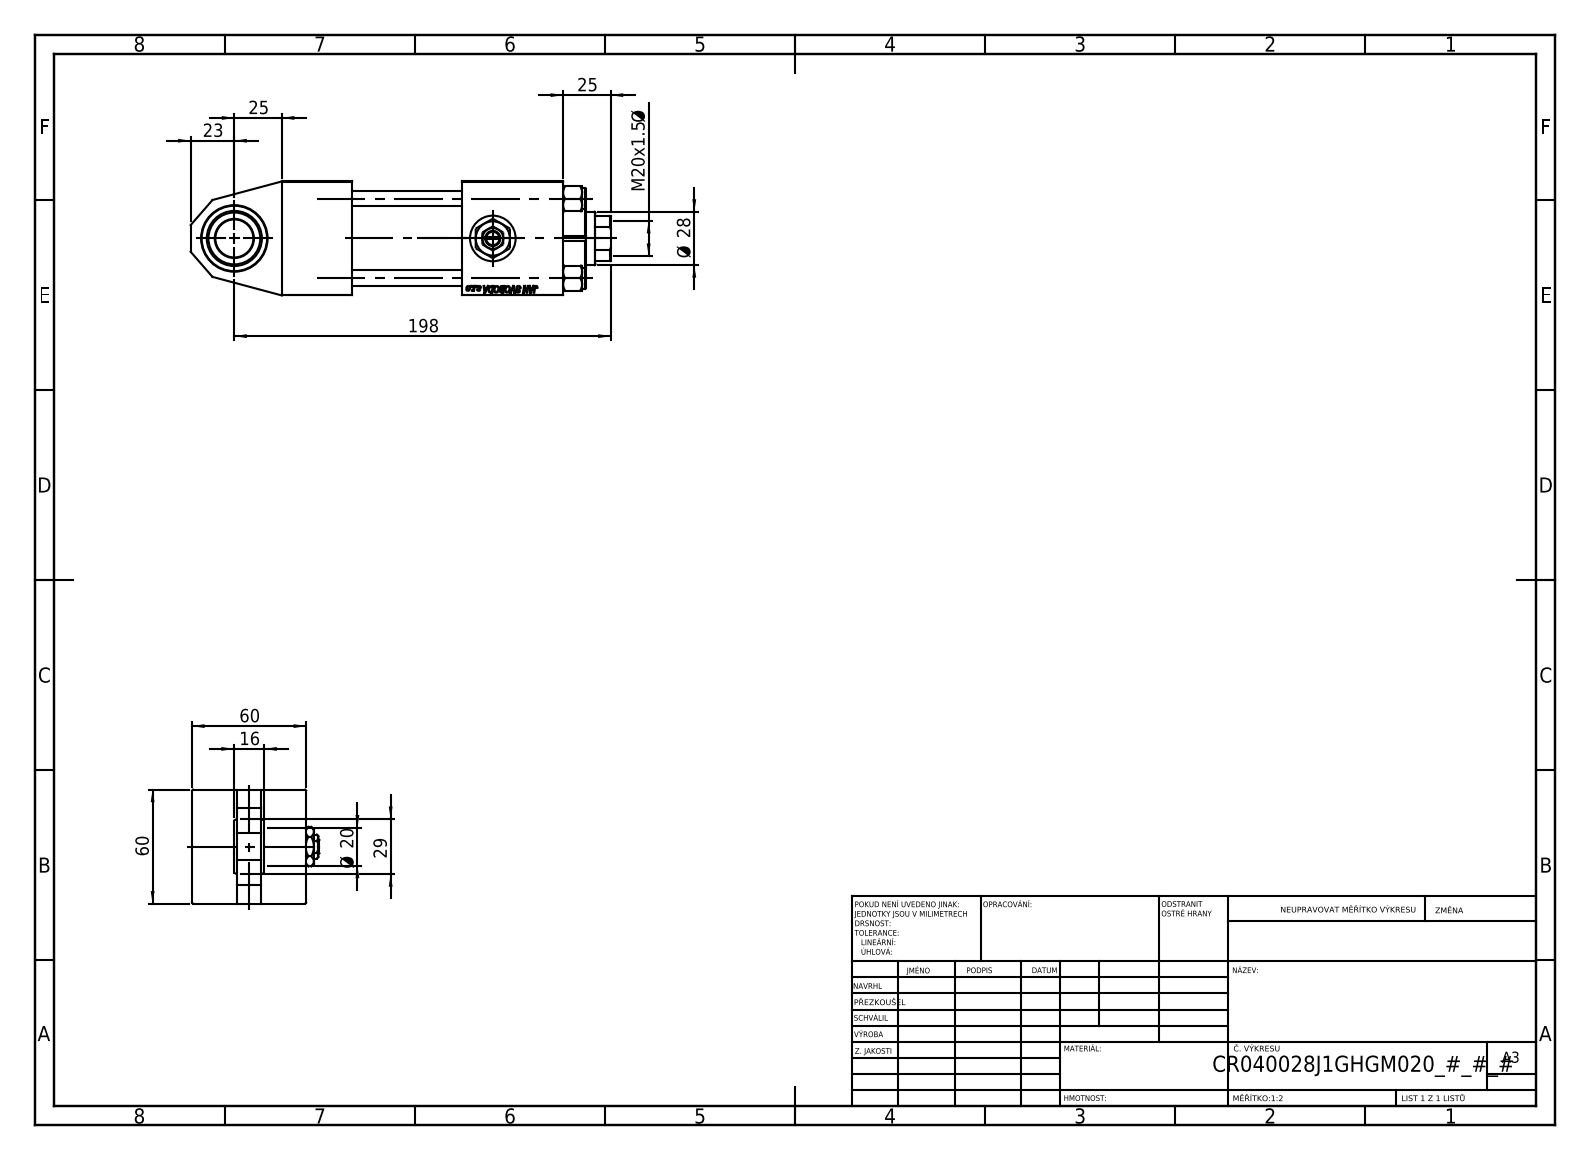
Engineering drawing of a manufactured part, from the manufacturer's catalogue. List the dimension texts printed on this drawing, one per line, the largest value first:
198
60
60
29
Ø 28
25
25
23
M20x1.5 Ø
Ø 20
16
